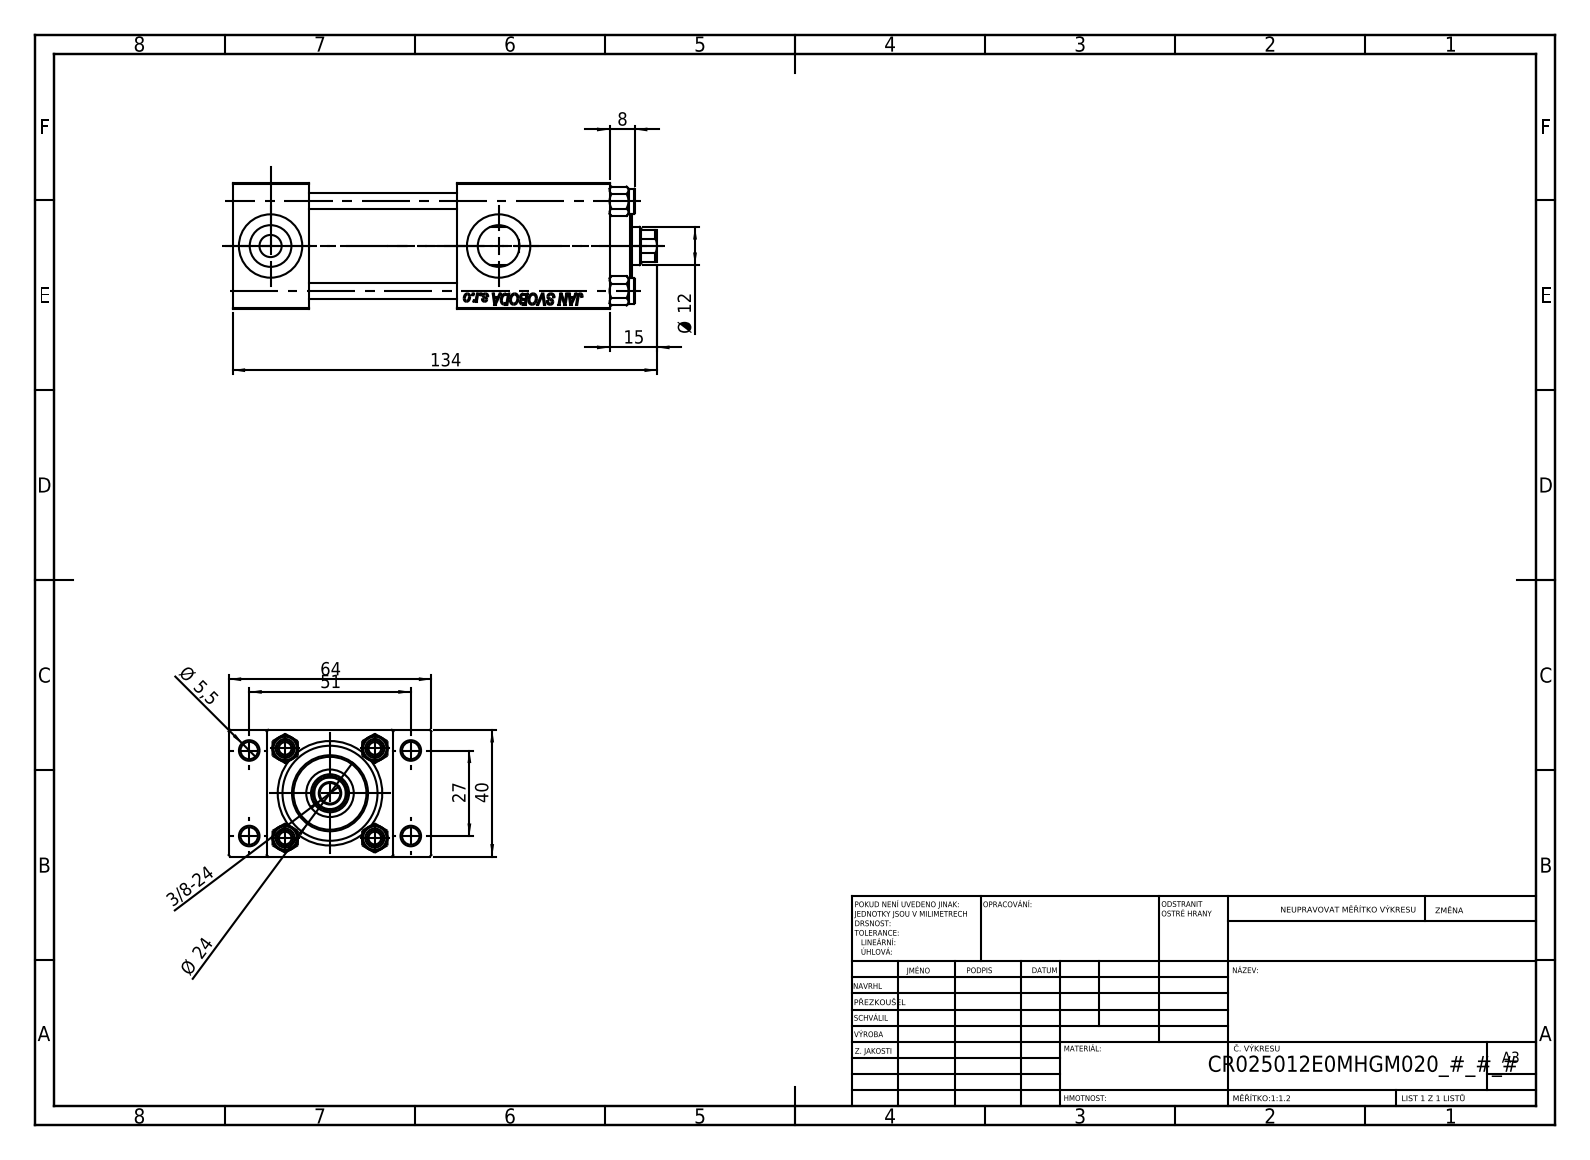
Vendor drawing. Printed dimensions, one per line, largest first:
134
64
51
40
27
Ø 24
15
Ø 12
8
Ø 5,5
3/8-24
